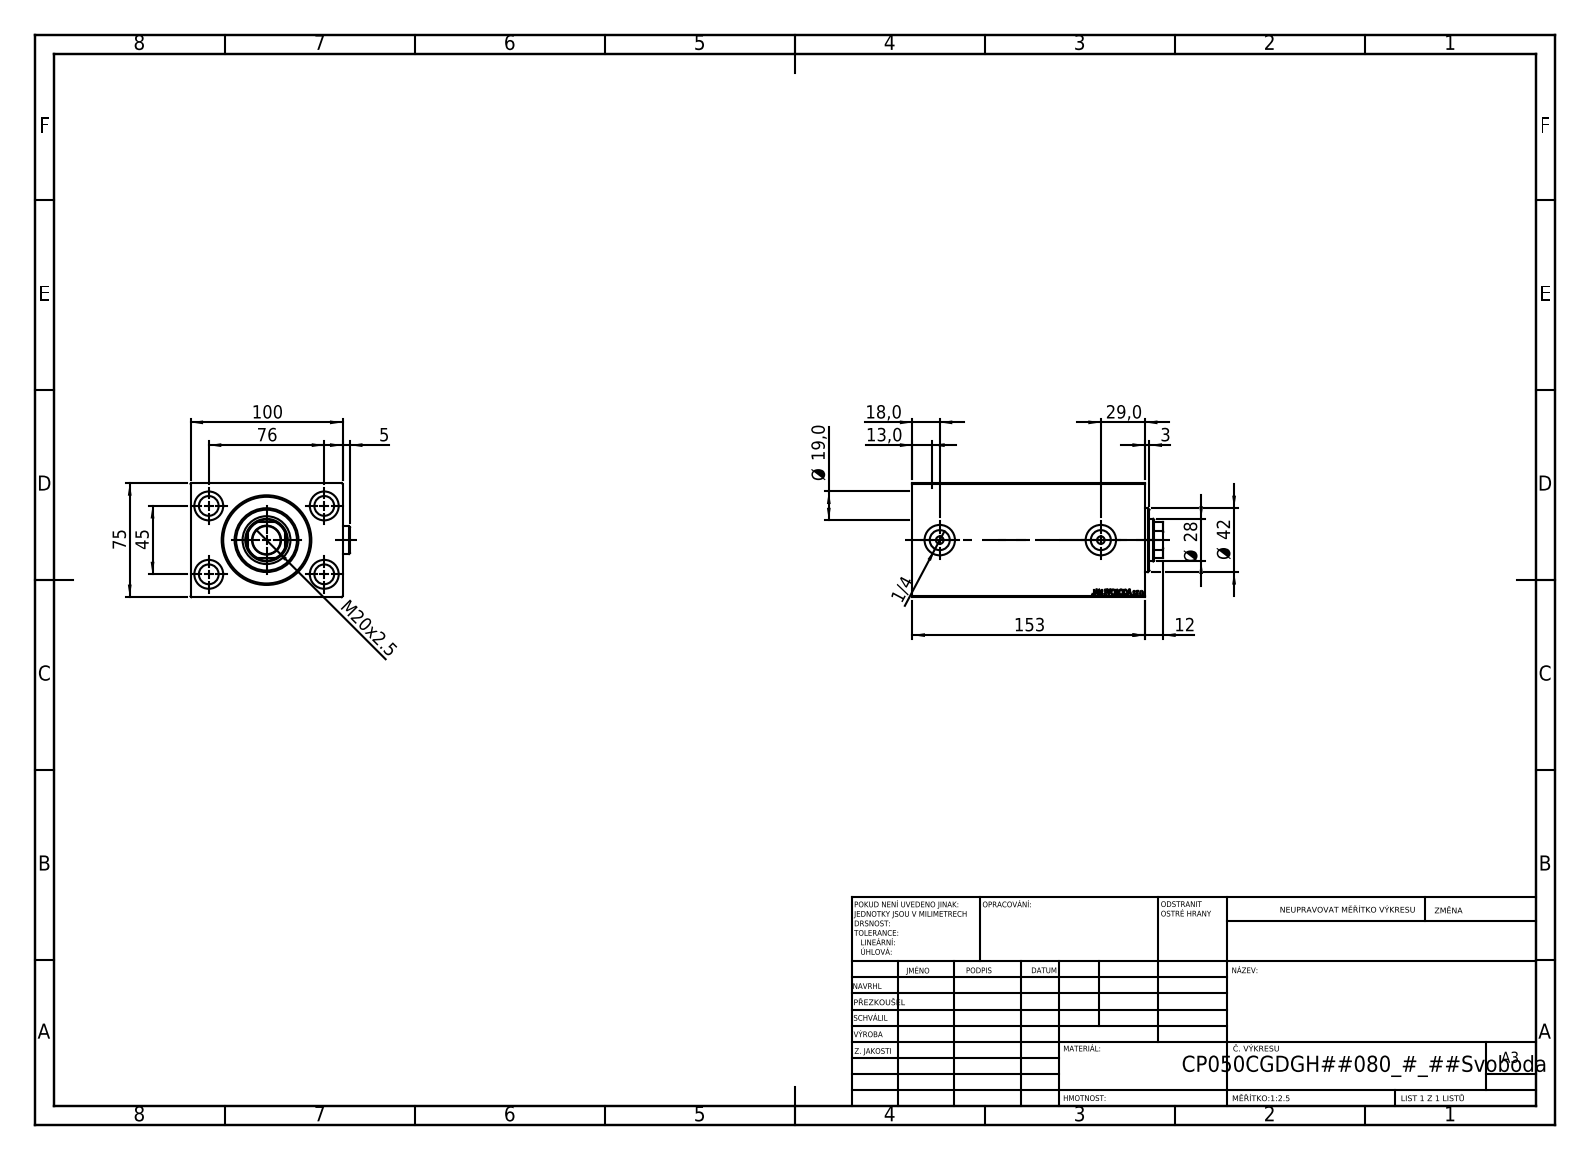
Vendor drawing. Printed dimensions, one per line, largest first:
153
100
76
75
45
Ø 42
29,0
Ø 28
M20x2.5
Ø 19,0
18,0
13,0
12
5
3
1/4
